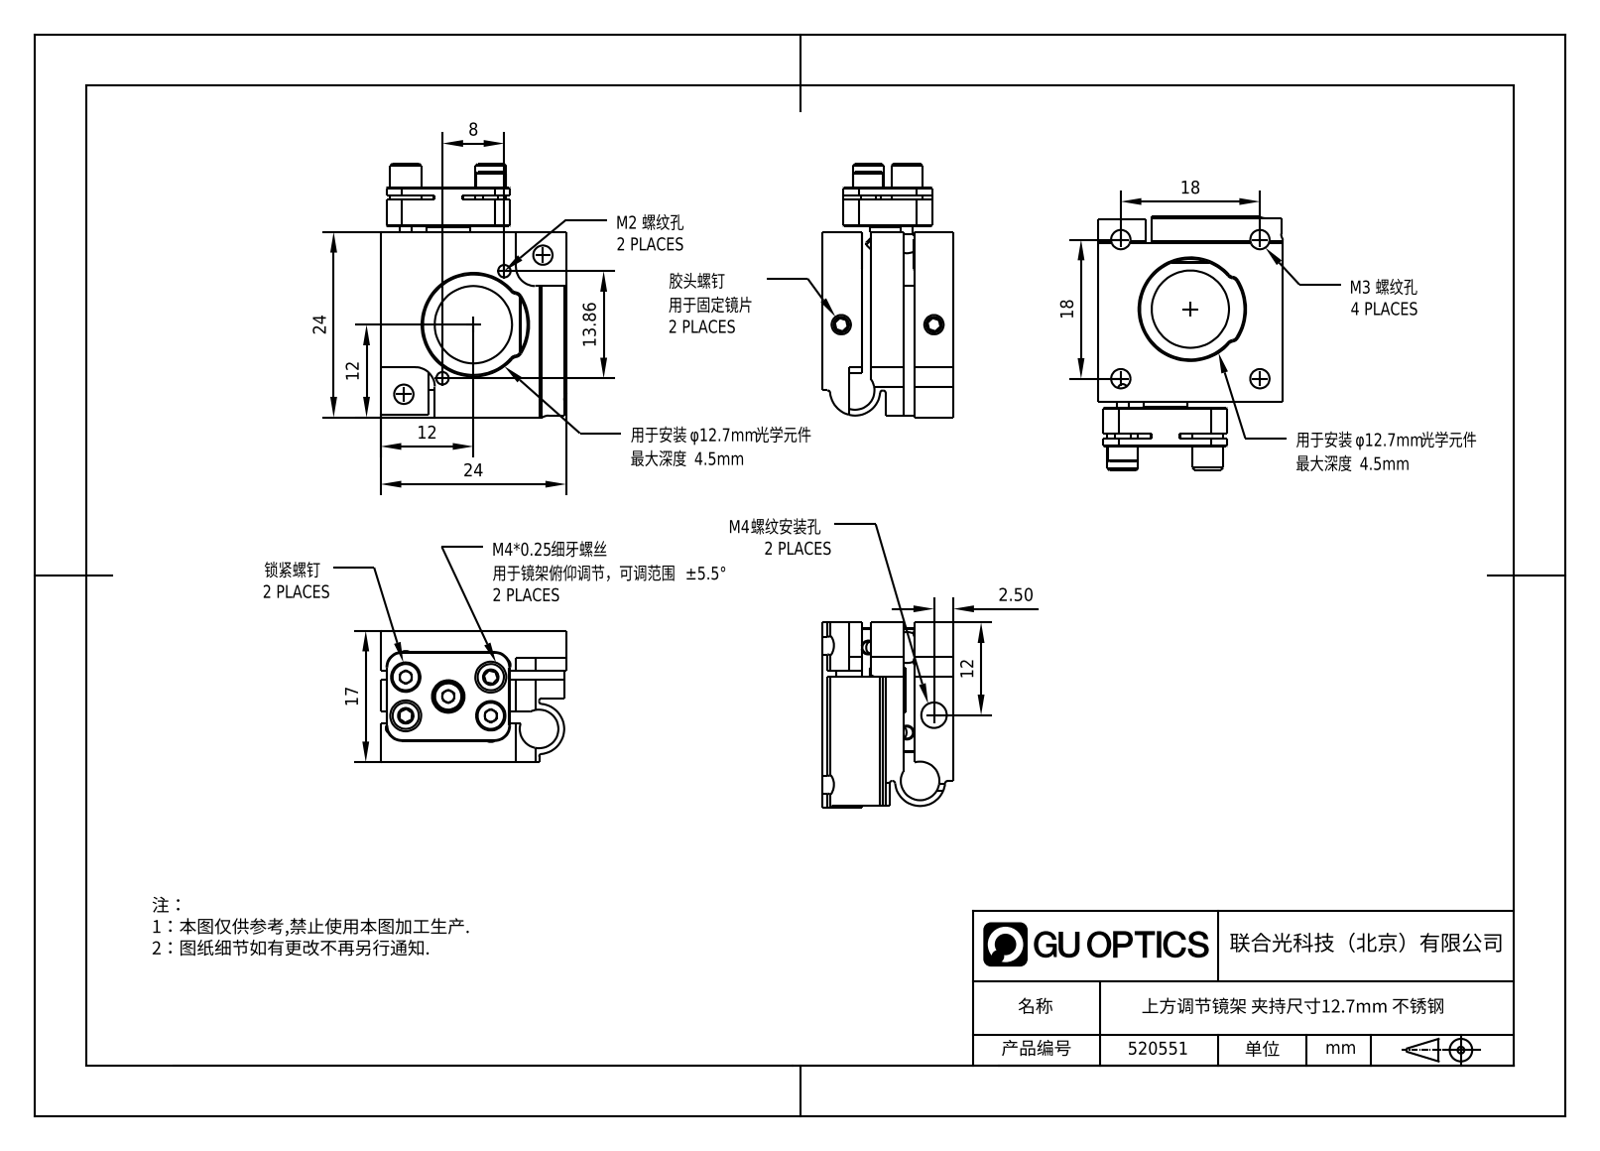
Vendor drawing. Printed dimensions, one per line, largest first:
24
24
18
18
17
13.86
12
12
12
8
2.50
